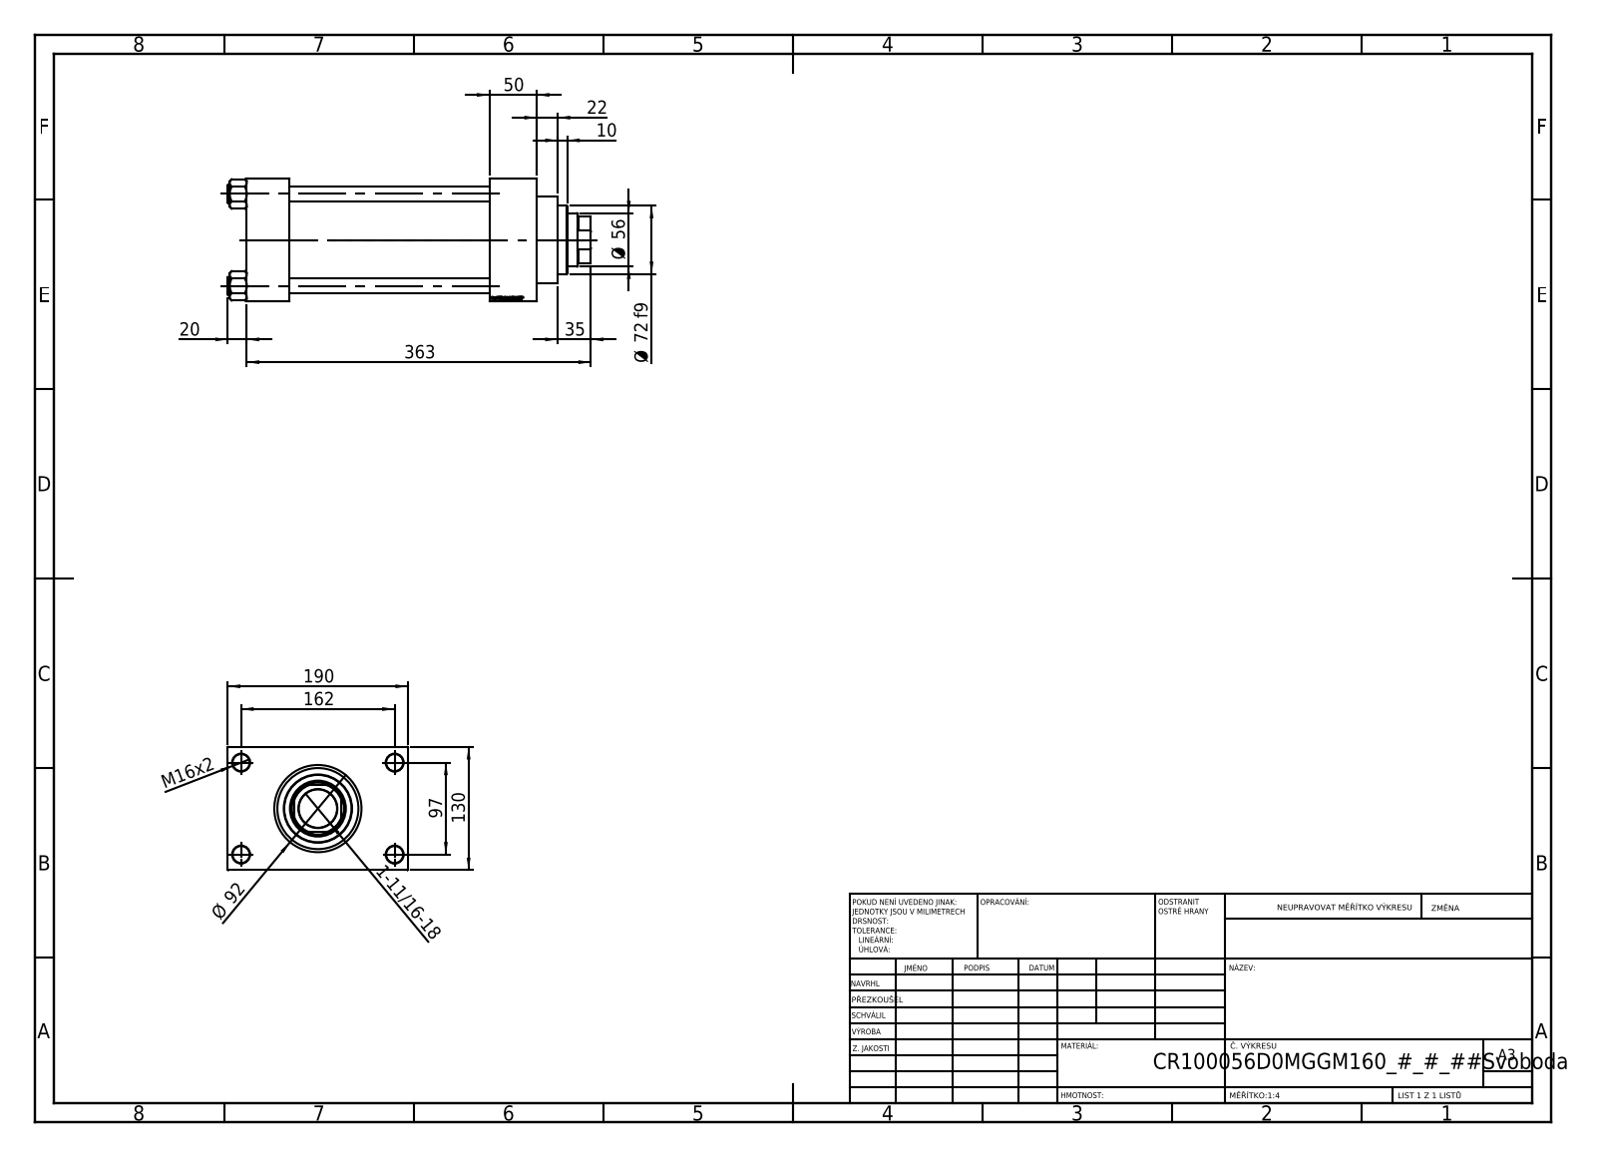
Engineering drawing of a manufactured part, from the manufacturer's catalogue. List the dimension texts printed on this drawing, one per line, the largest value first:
363
190
162
130
97
Ø 92
Ø 72 f9
Ø 56
50
35
22
20
M16x2
10
1-11/16-18
